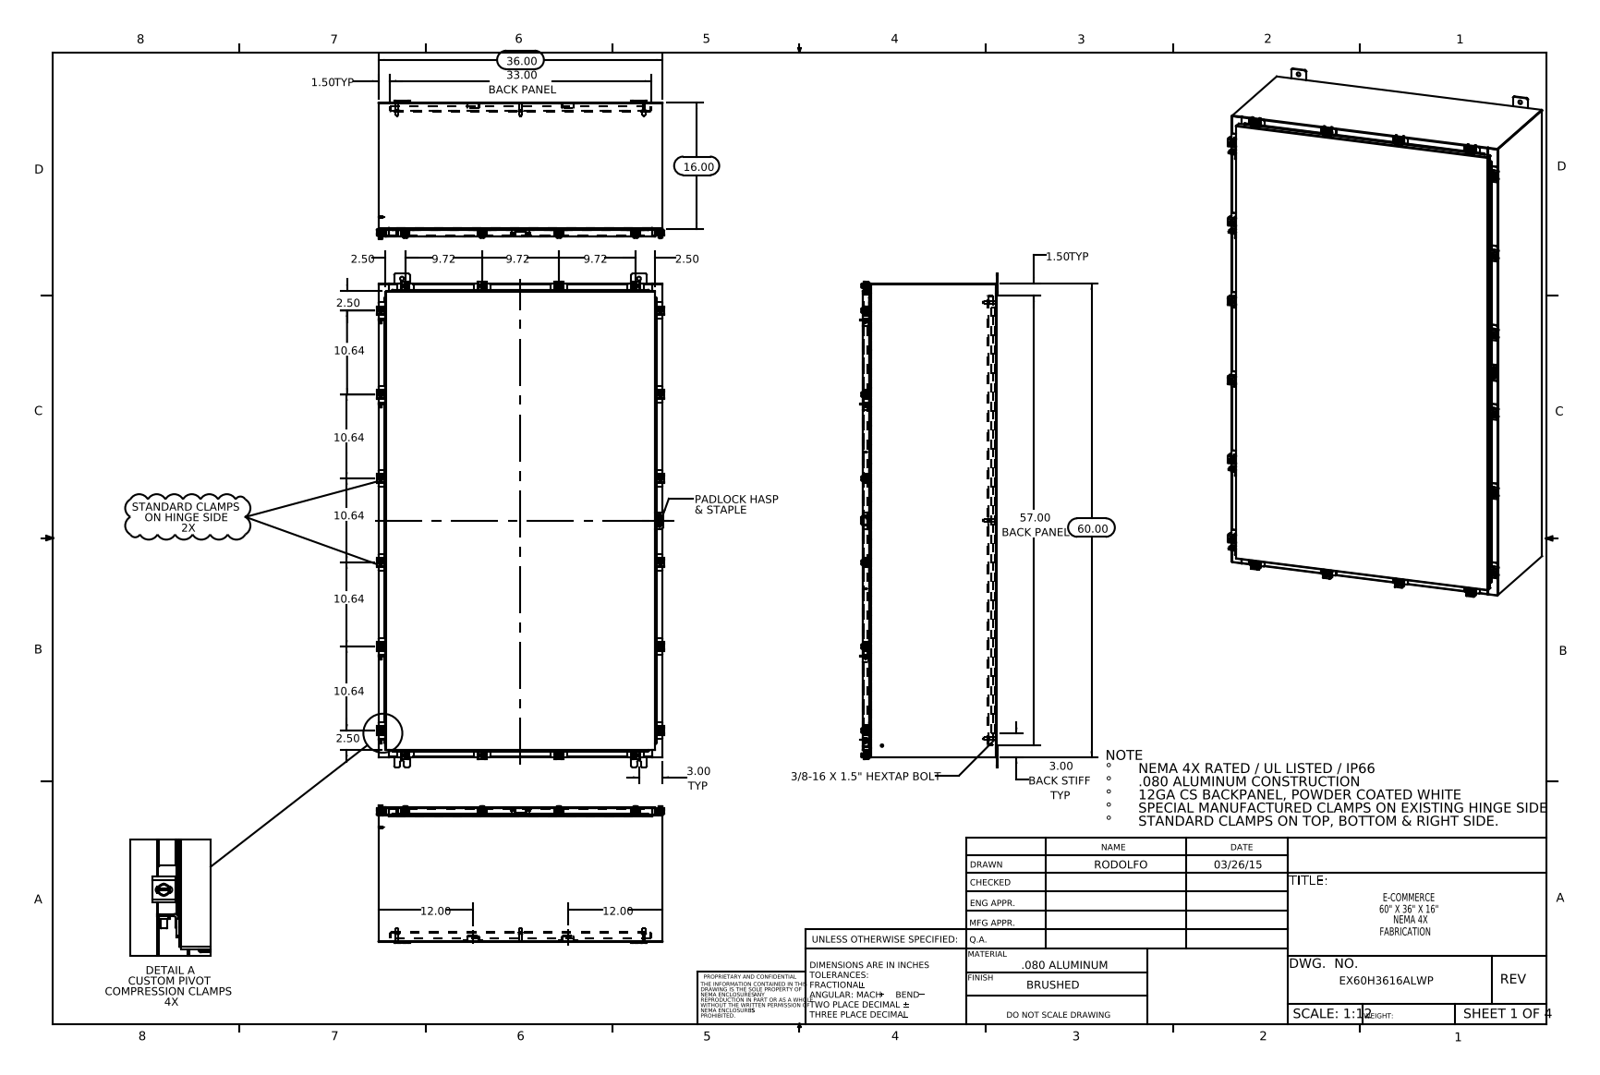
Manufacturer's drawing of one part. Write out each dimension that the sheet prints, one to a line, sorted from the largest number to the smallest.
60.00
57.00 BACK PANEL
36.00
33.00 BACK PANEL
16.00
12.00
12.00
10.64
10.64
10.64
10.64
10.64
9.72
9.72
9.72
3.00 TYP
3.00 BACK STIFF TYP
2.50
2.50
2.50
2.50
1.50 TYP
1.50 TYP
